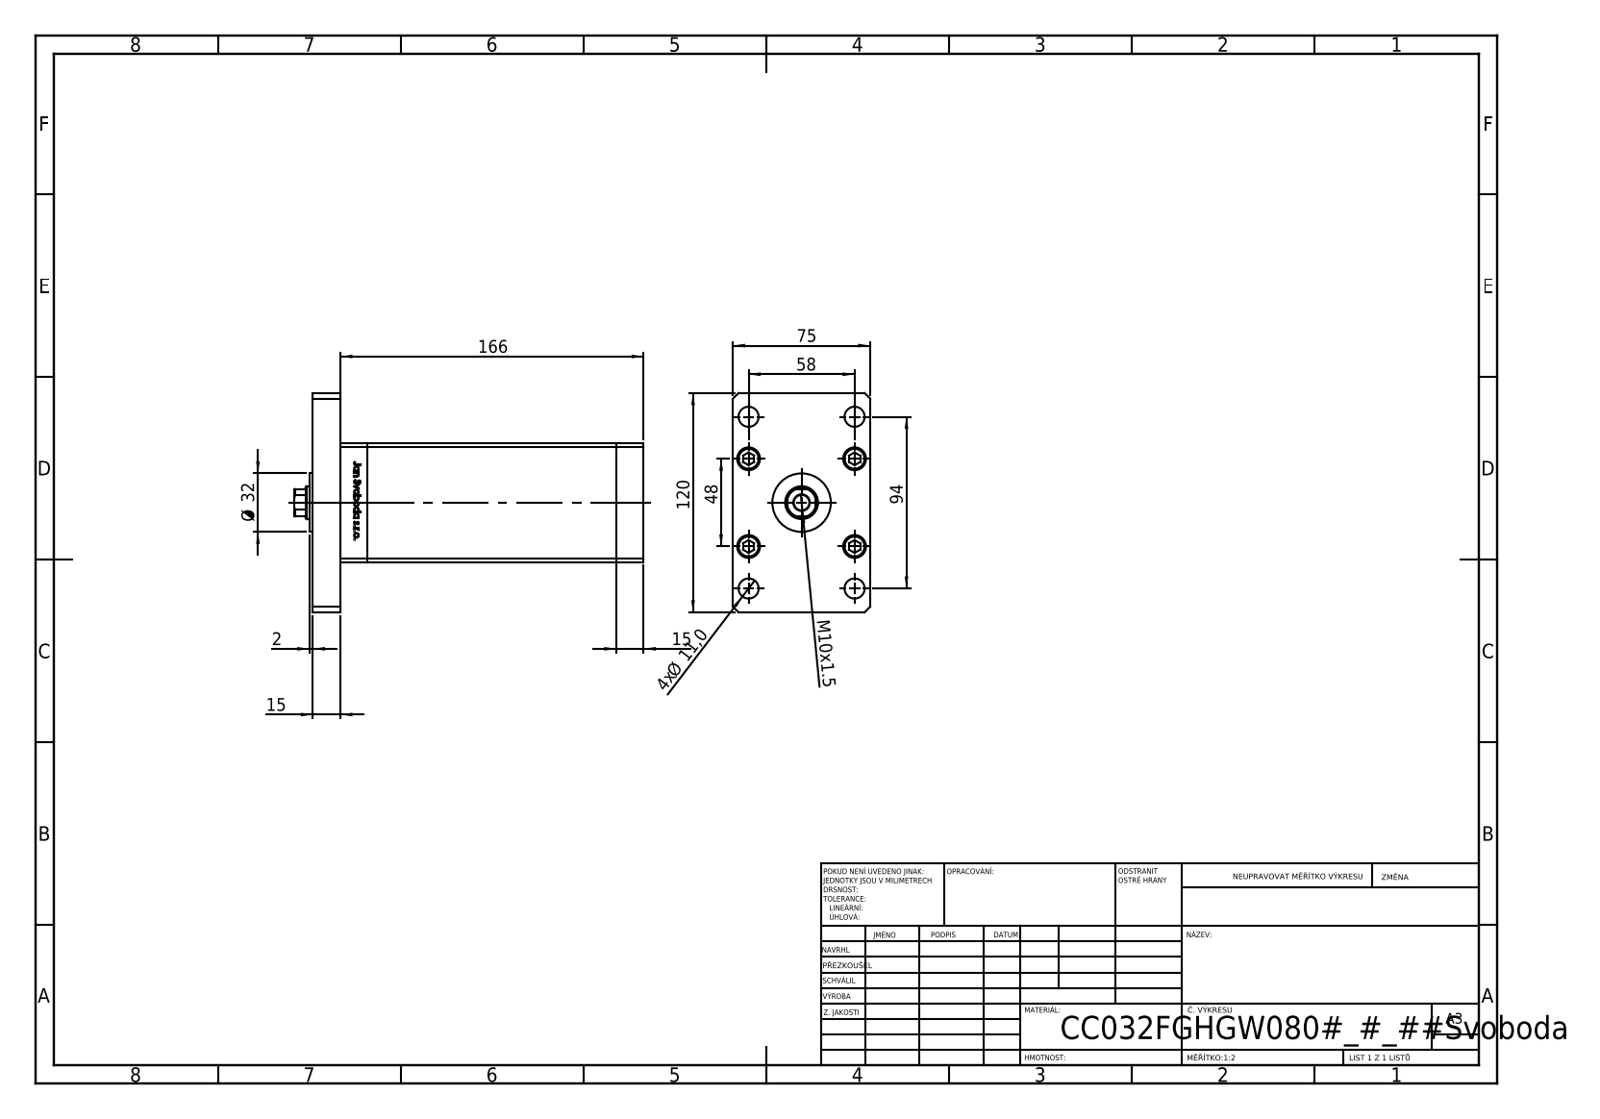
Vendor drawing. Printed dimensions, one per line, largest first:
166
120
94
75
58
48
Ø 32
15
15
4x Ø 11,0
M10x1.5
2
